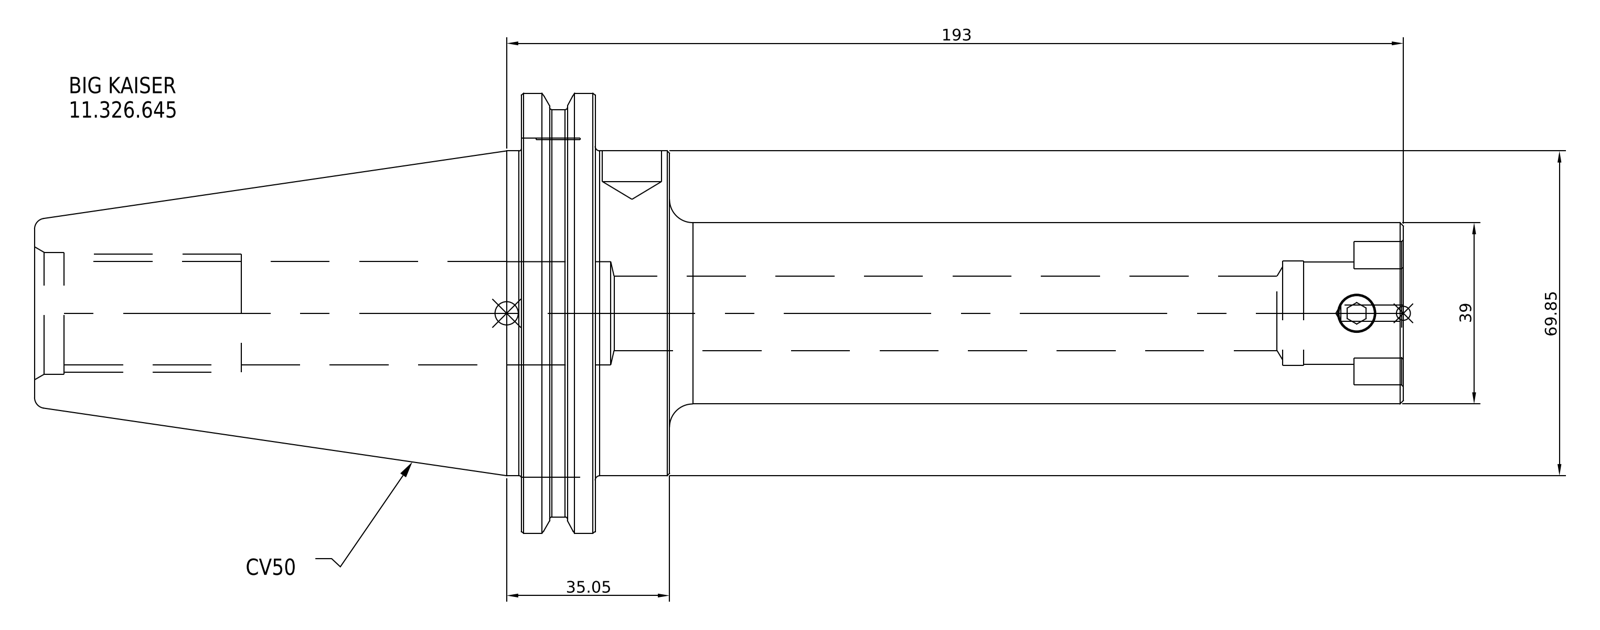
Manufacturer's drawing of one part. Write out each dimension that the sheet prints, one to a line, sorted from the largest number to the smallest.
193
69.85
39
35.05
